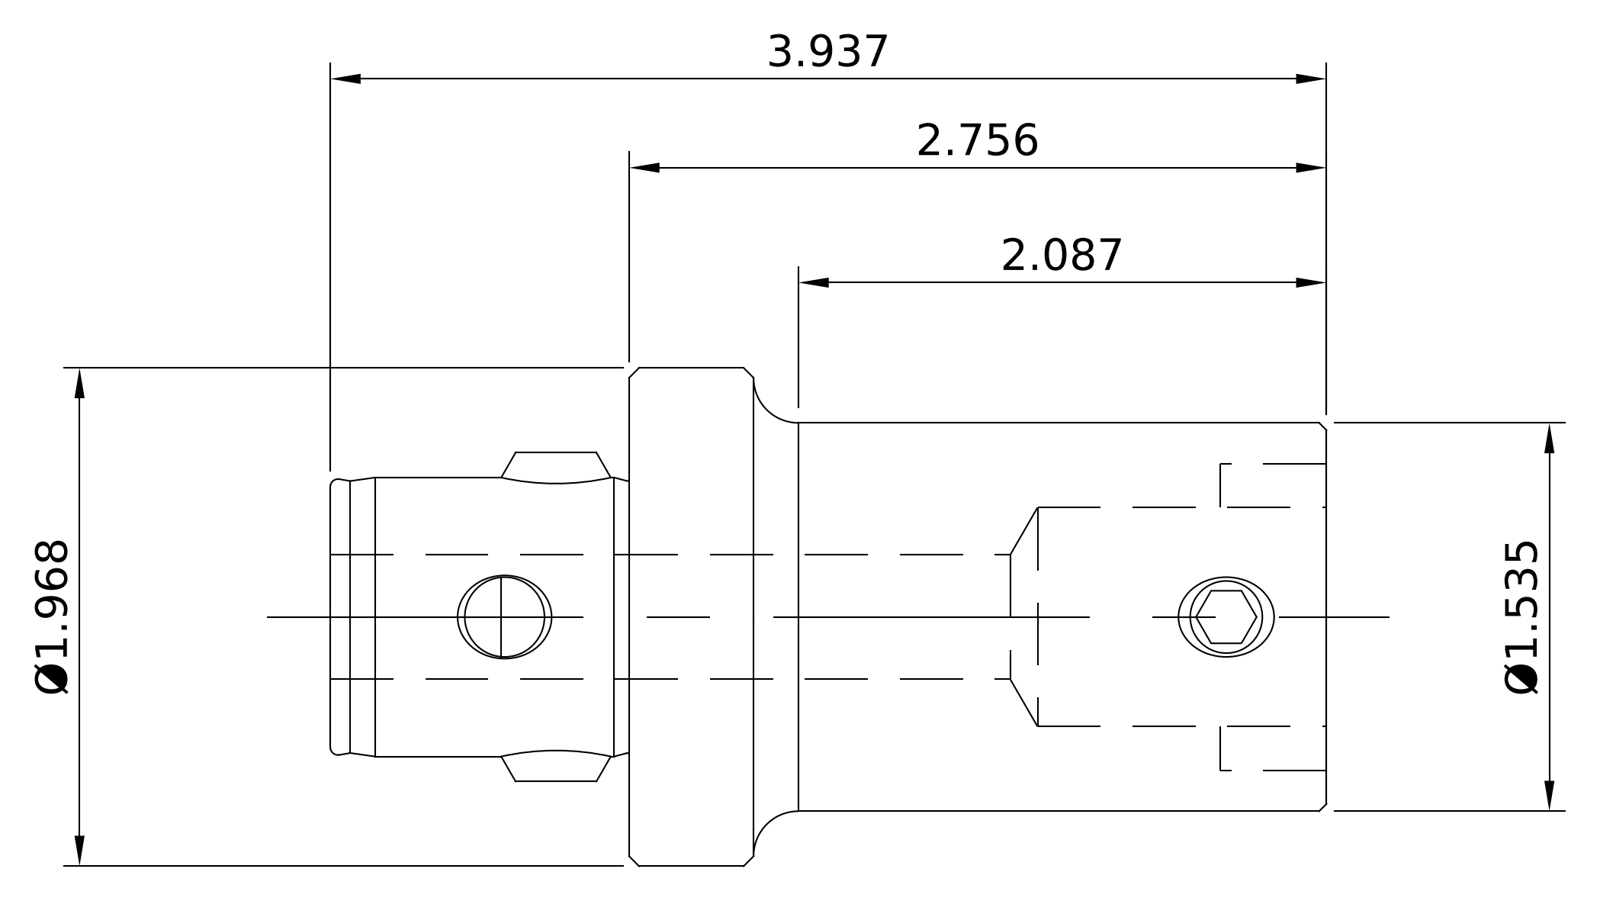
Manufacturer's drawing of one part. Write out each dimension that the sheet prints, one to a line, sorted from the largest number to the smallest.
3.937
2.756
2.087
Ø1.968
Ø1.535
